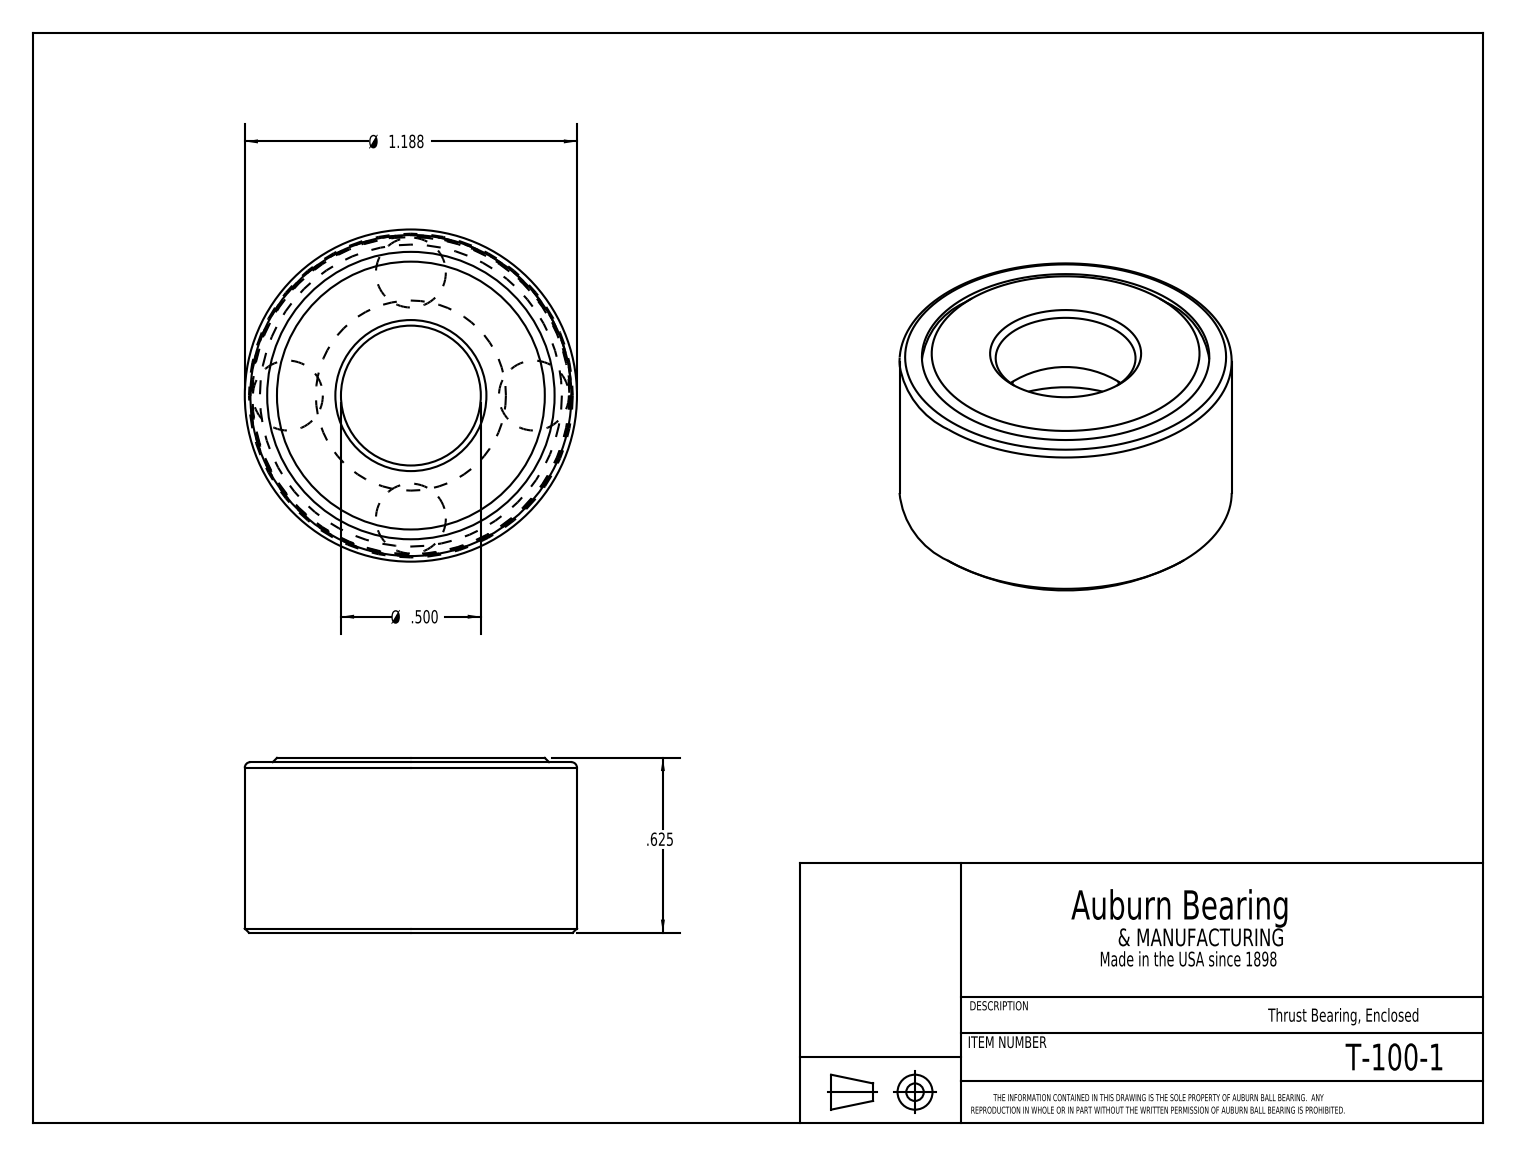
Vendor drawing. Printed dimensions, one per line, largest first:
Ø 1.188
.625
Ø .500
